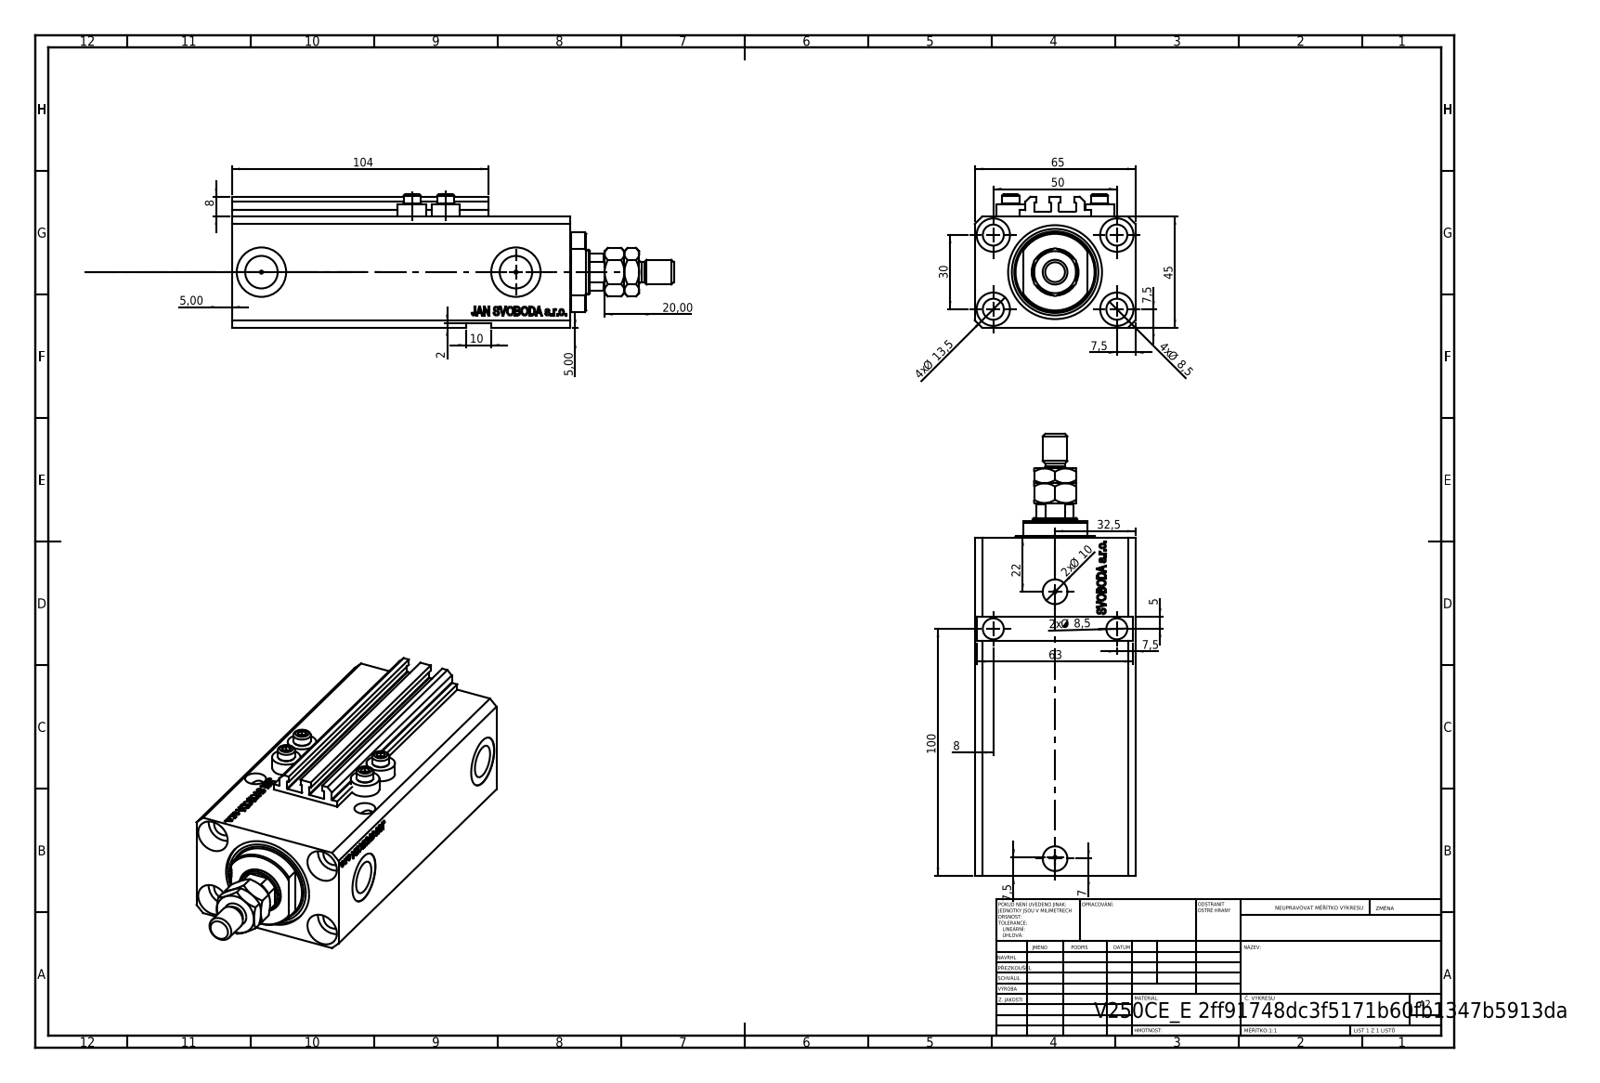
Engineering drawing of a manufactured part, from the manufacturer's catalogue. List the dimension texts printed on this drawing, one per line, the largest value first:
104
100
65
63
50
45
32,5
30
22
20,00
4x Ø 13,5
10
2x Ø 10
4x Ø 8,5
2x Ø 8,5
8
8
7,5
7,5
7,5
7,5
7
5,00
5,00
5
2
